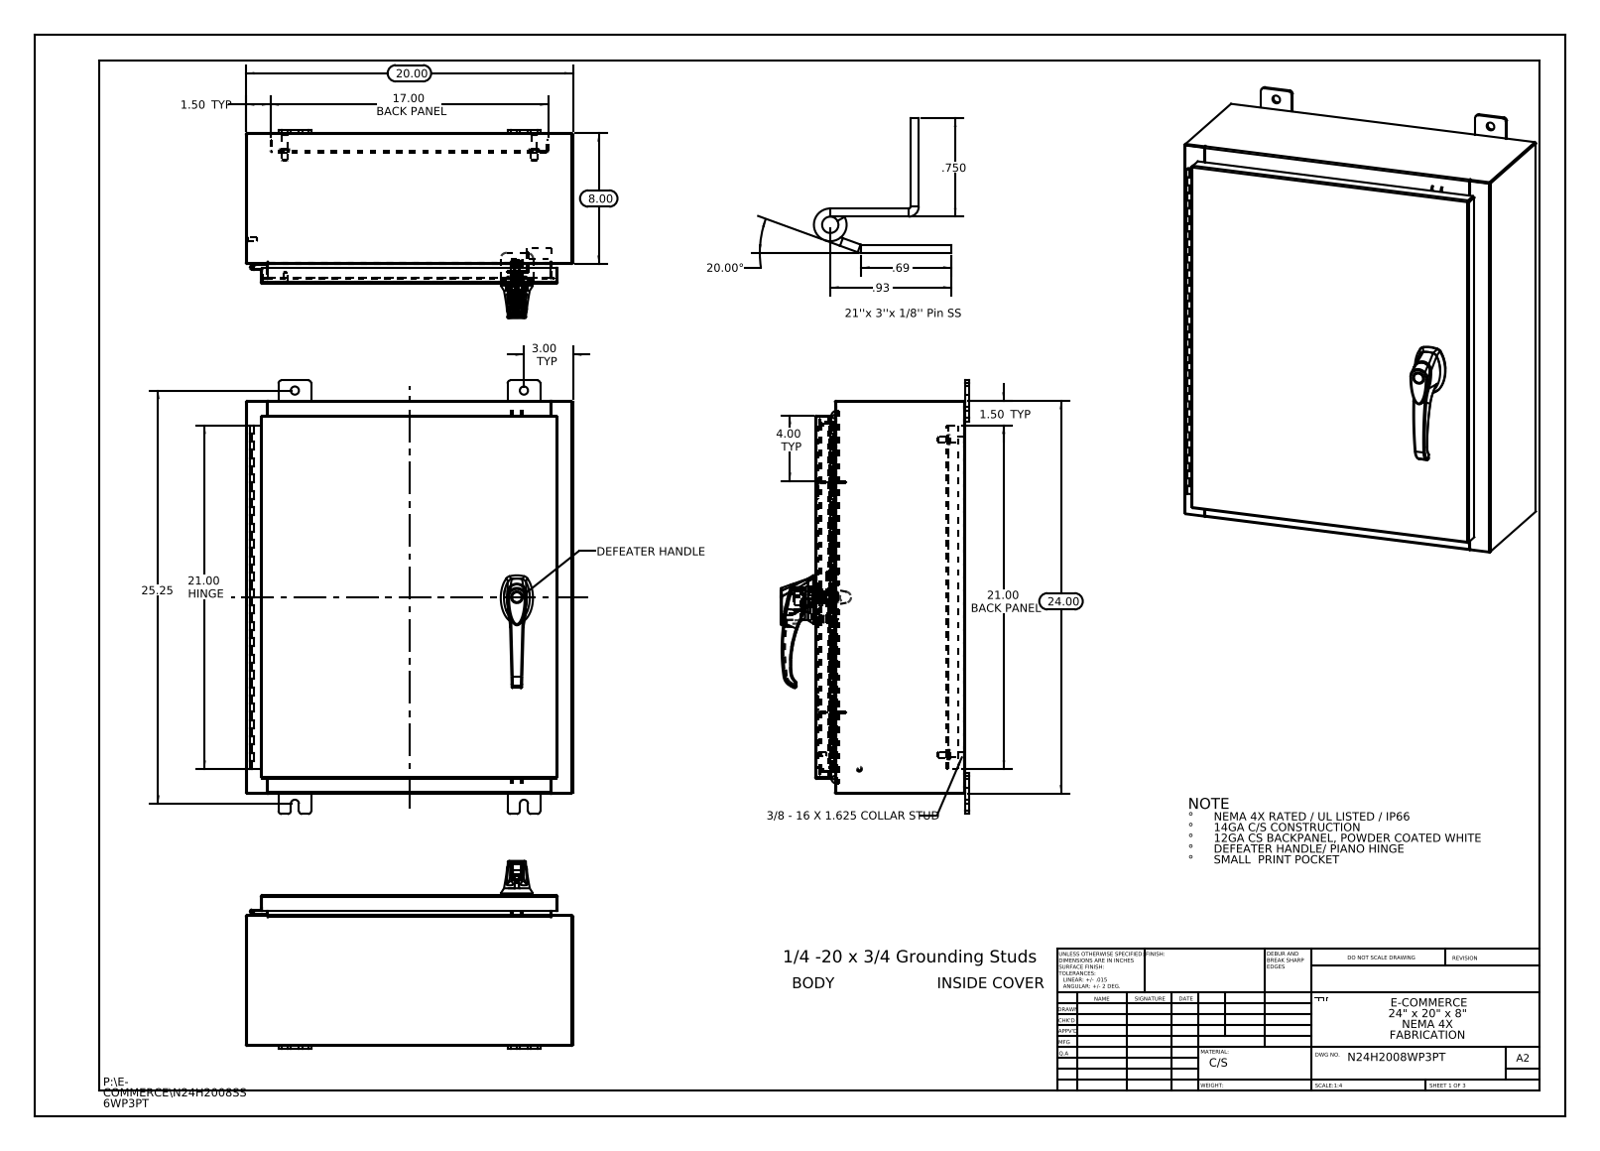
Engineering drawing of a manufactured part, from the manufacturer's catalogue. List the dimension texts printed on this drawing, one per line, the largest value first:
25.25
24.00
21.00 HINGE
21.00 BACK PANEL
20.00
20.00°
17.00 BACK PANEL
8.00
4.00 TYP
3.00 TYP
1.50 TYP
1.50 TYP
.93
.750
.69
